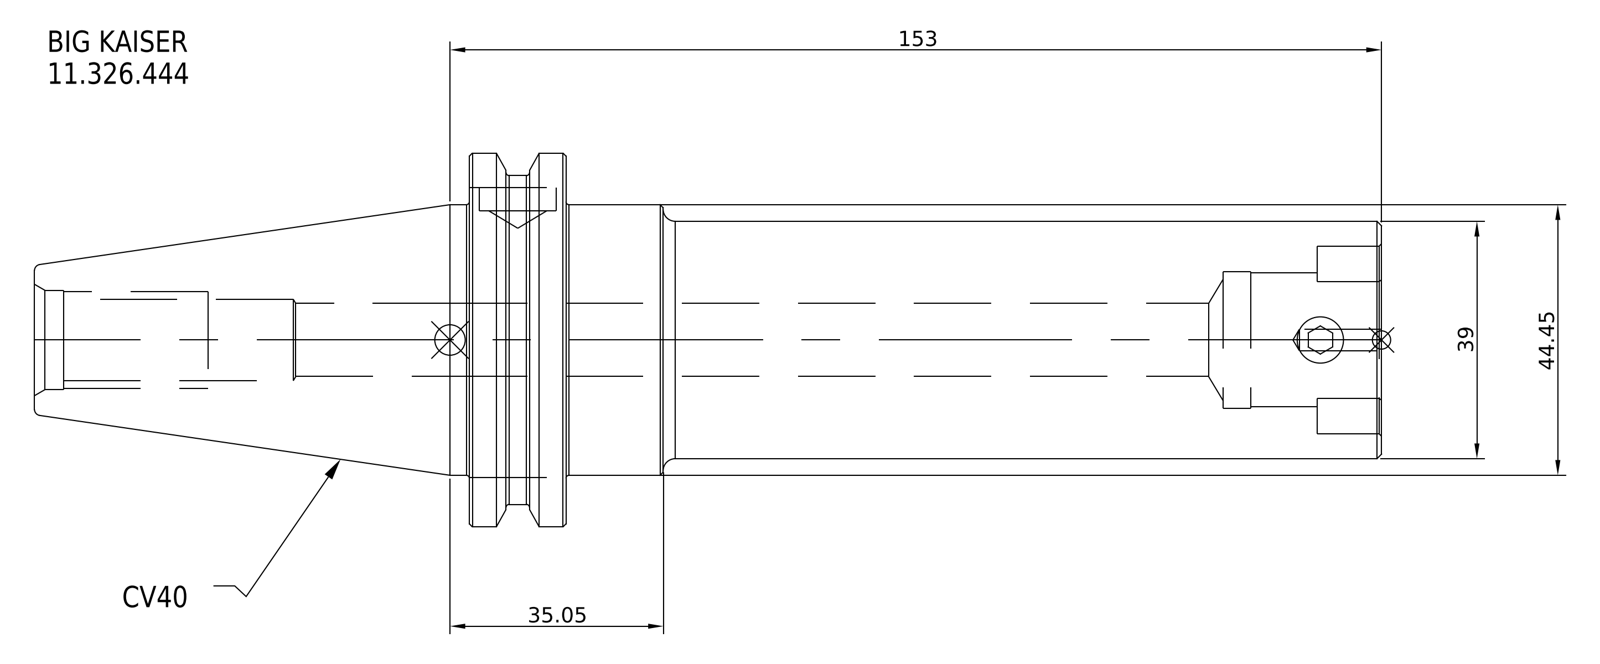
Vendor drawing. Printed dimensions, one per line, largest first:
153
44.45
39
35.05
